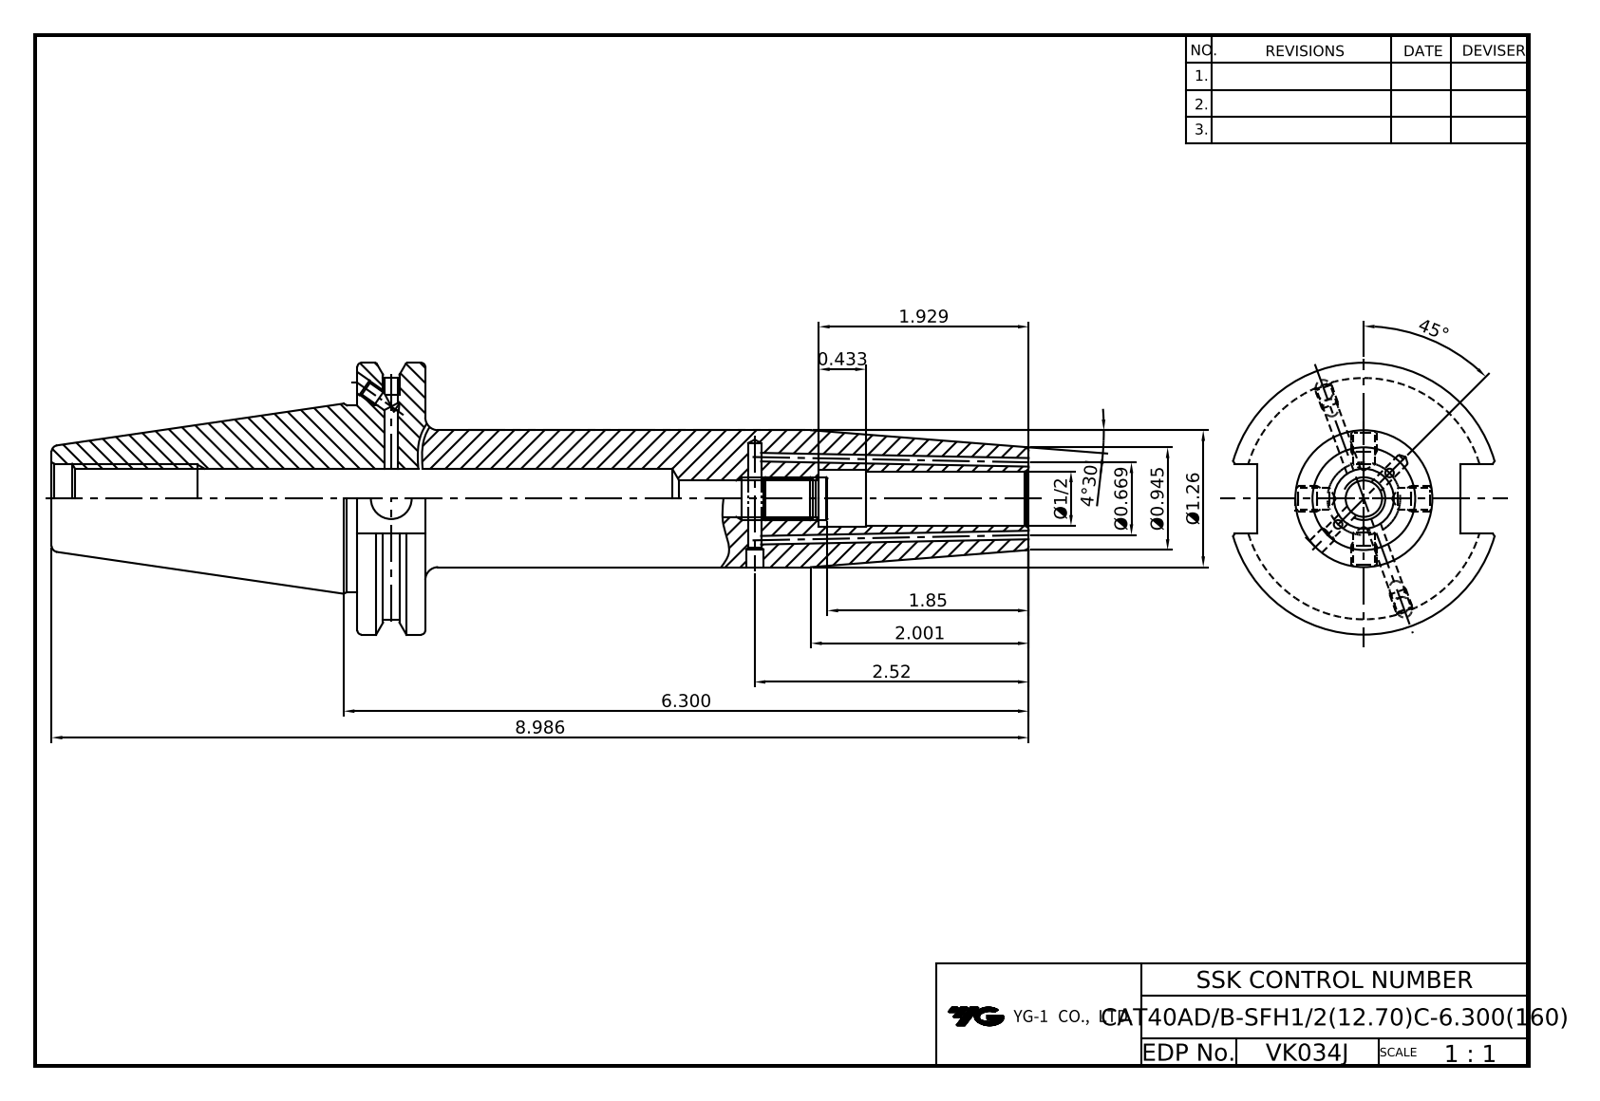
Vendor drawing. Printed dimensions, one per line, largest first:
45°
8.986
6.300
4°30'
2.52
2.001
1.929
1.85
Ø1.26
Ø0.945
Ø0.669
Ø1/2
0.433
